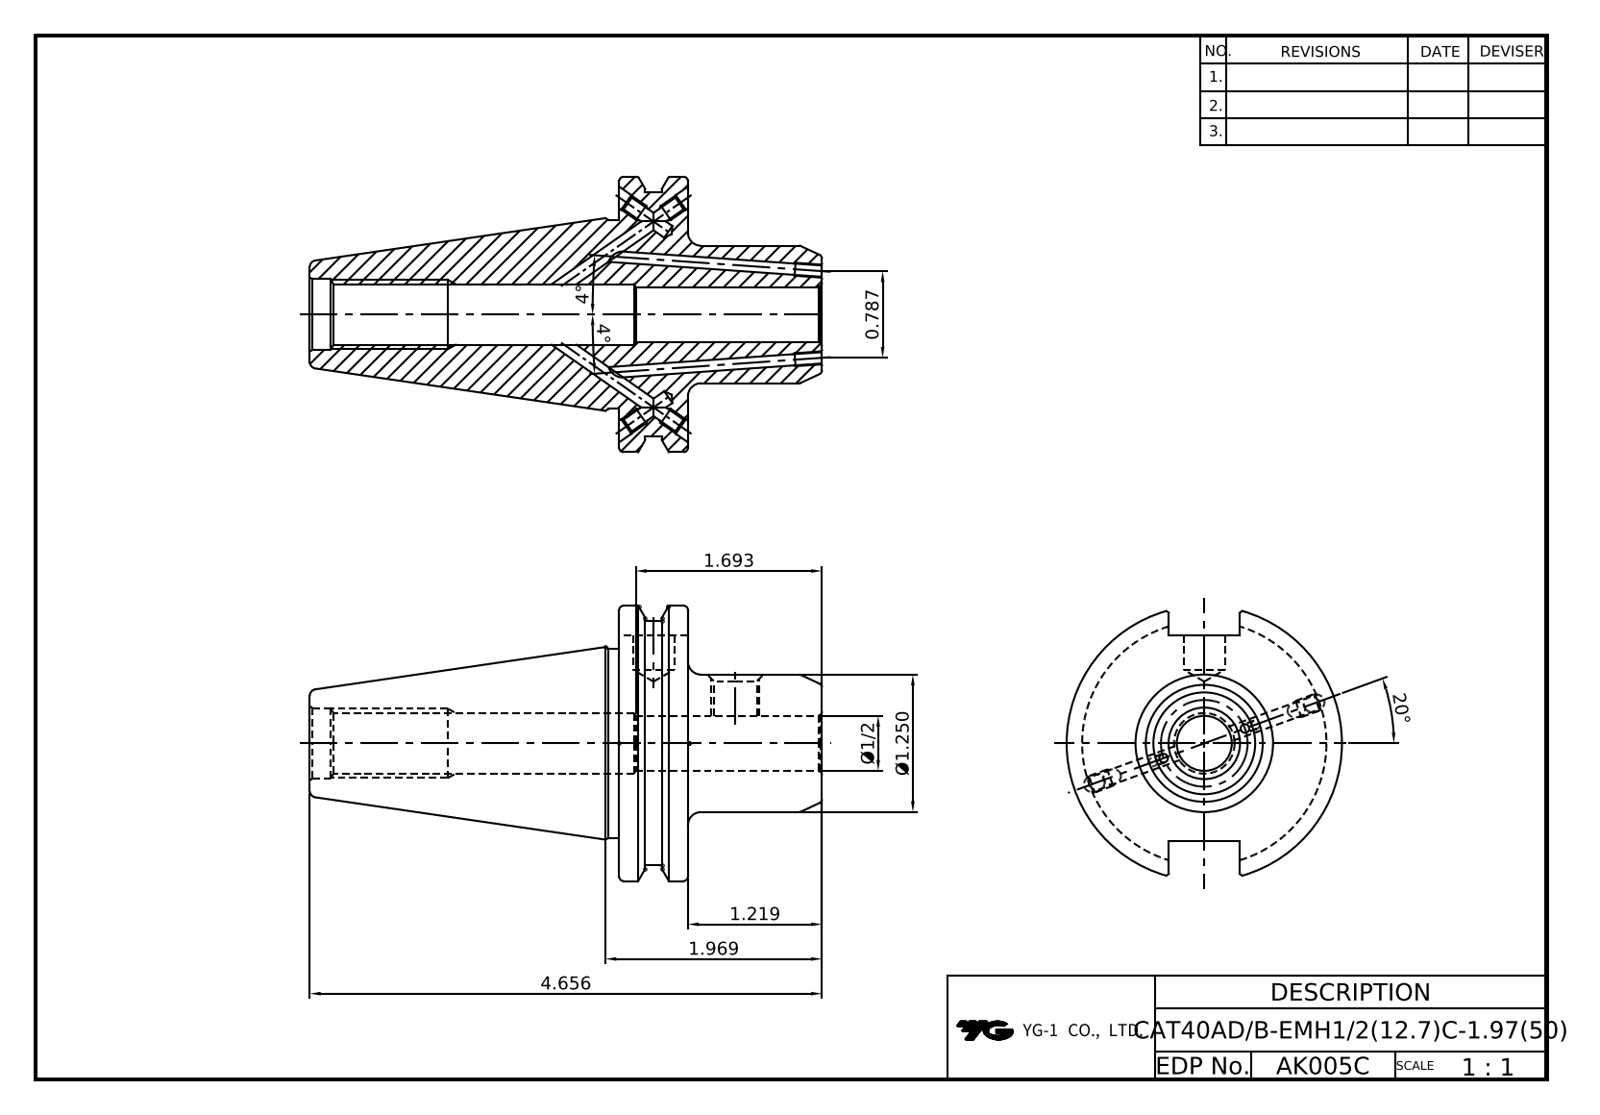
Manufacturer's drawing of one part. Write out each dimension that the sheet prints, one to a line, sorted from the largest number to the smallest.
20°
4.656
4°
4°
1.969
1.693
Ø1.250
1.219
0.787
Ø1/2
